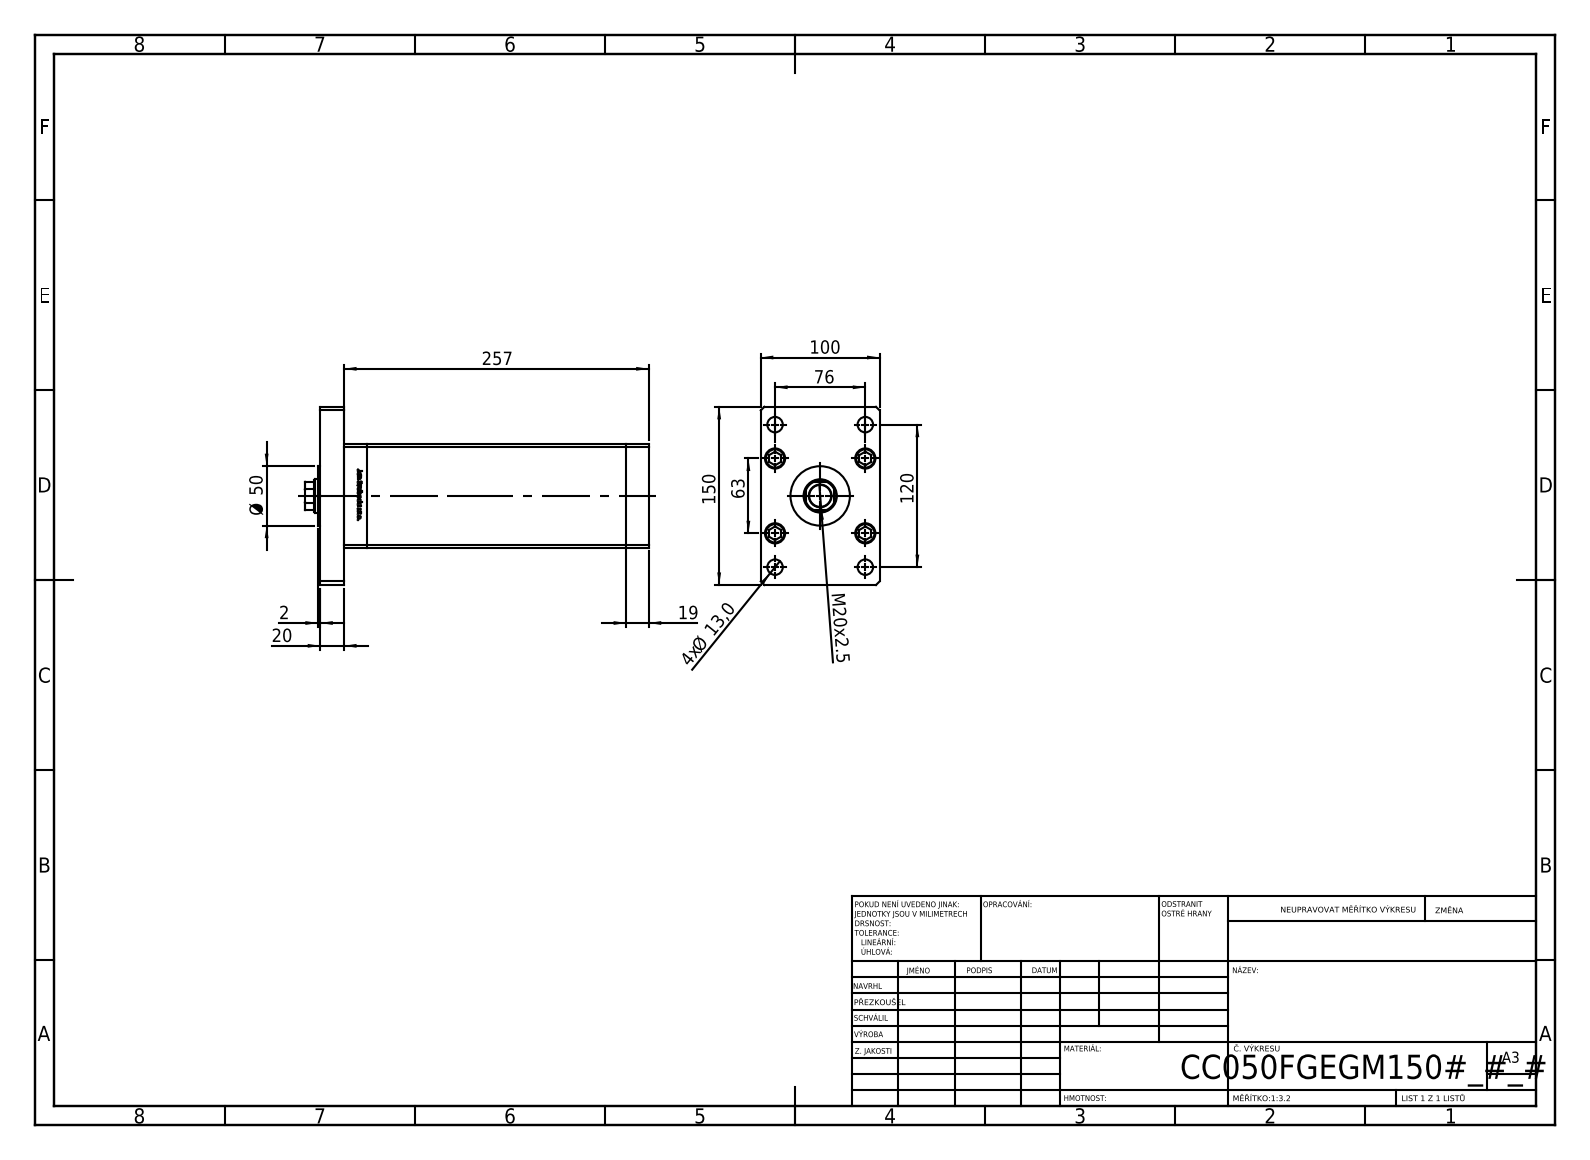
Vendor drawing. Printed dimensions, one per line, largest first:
257
150
120
100
76
63
Ø 50
20
M20x2.5
19
4x Ø 13,0
2
